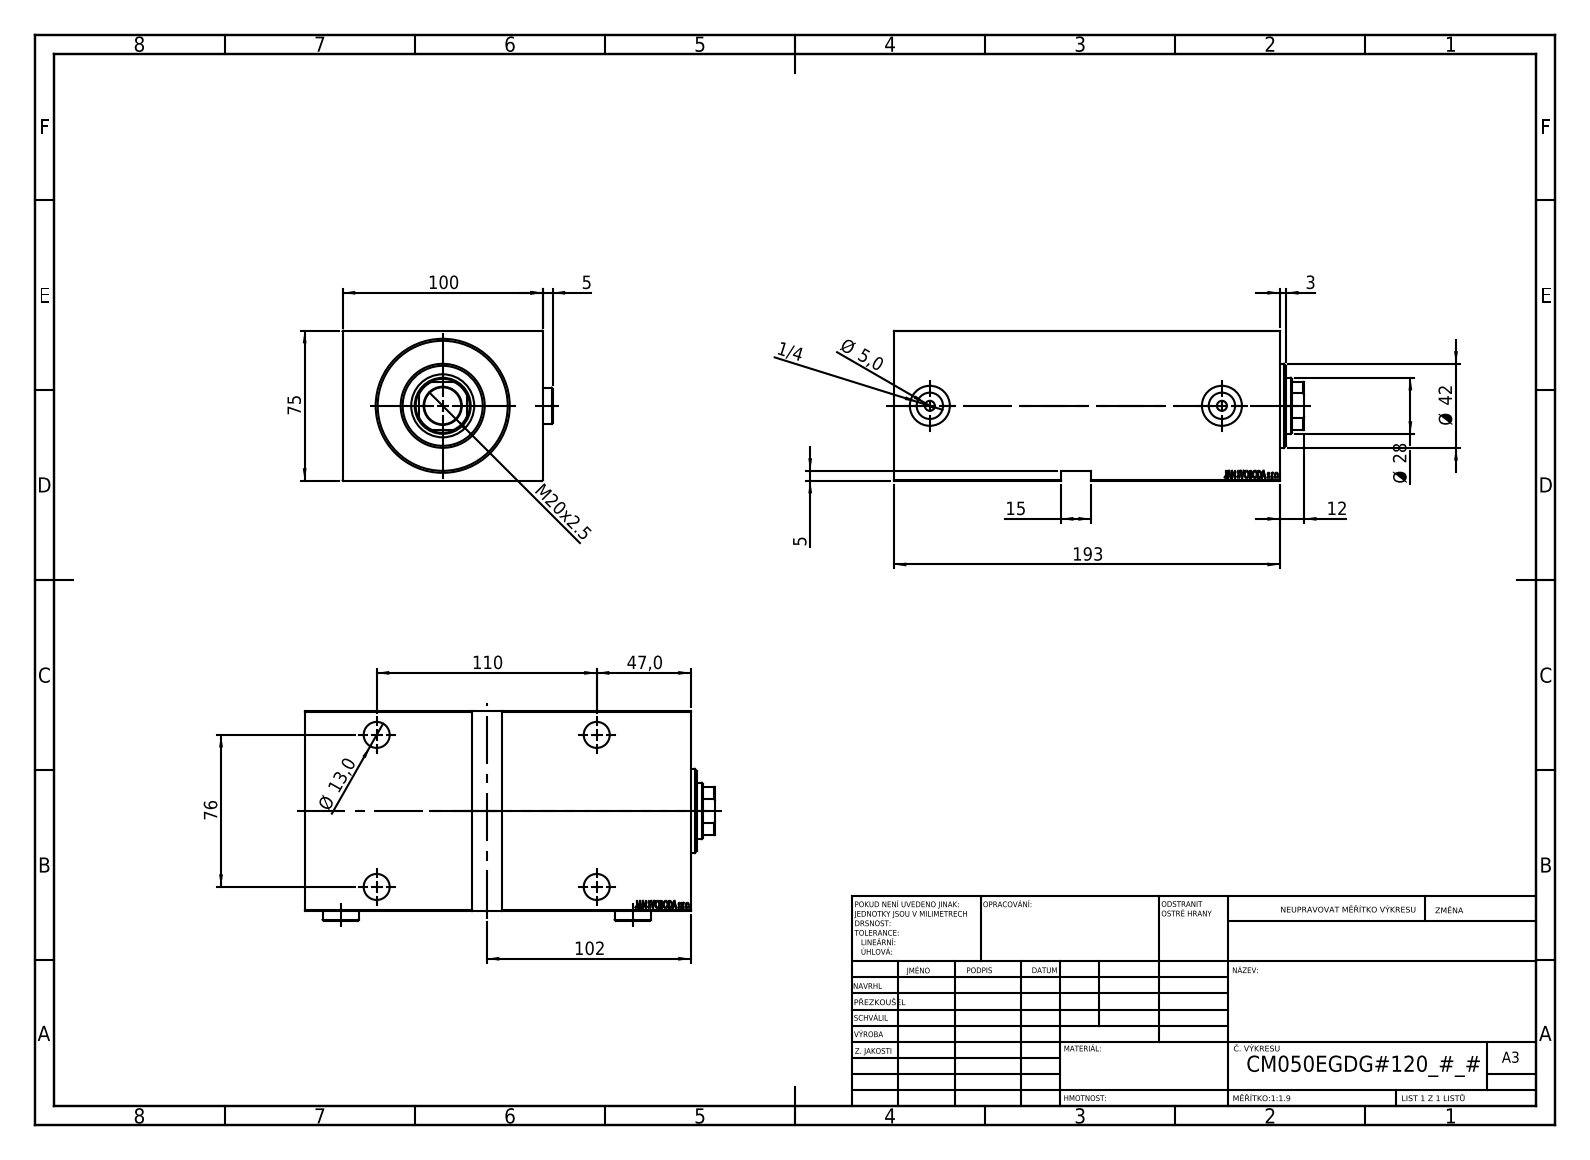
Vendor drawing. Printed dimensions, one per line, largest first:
193
110
102
100
76
75
47,0
Ø 42
Ø 28
M20x2.5
15
Ø 13,0
12
5
Ø 5,0
5
3
1/4
